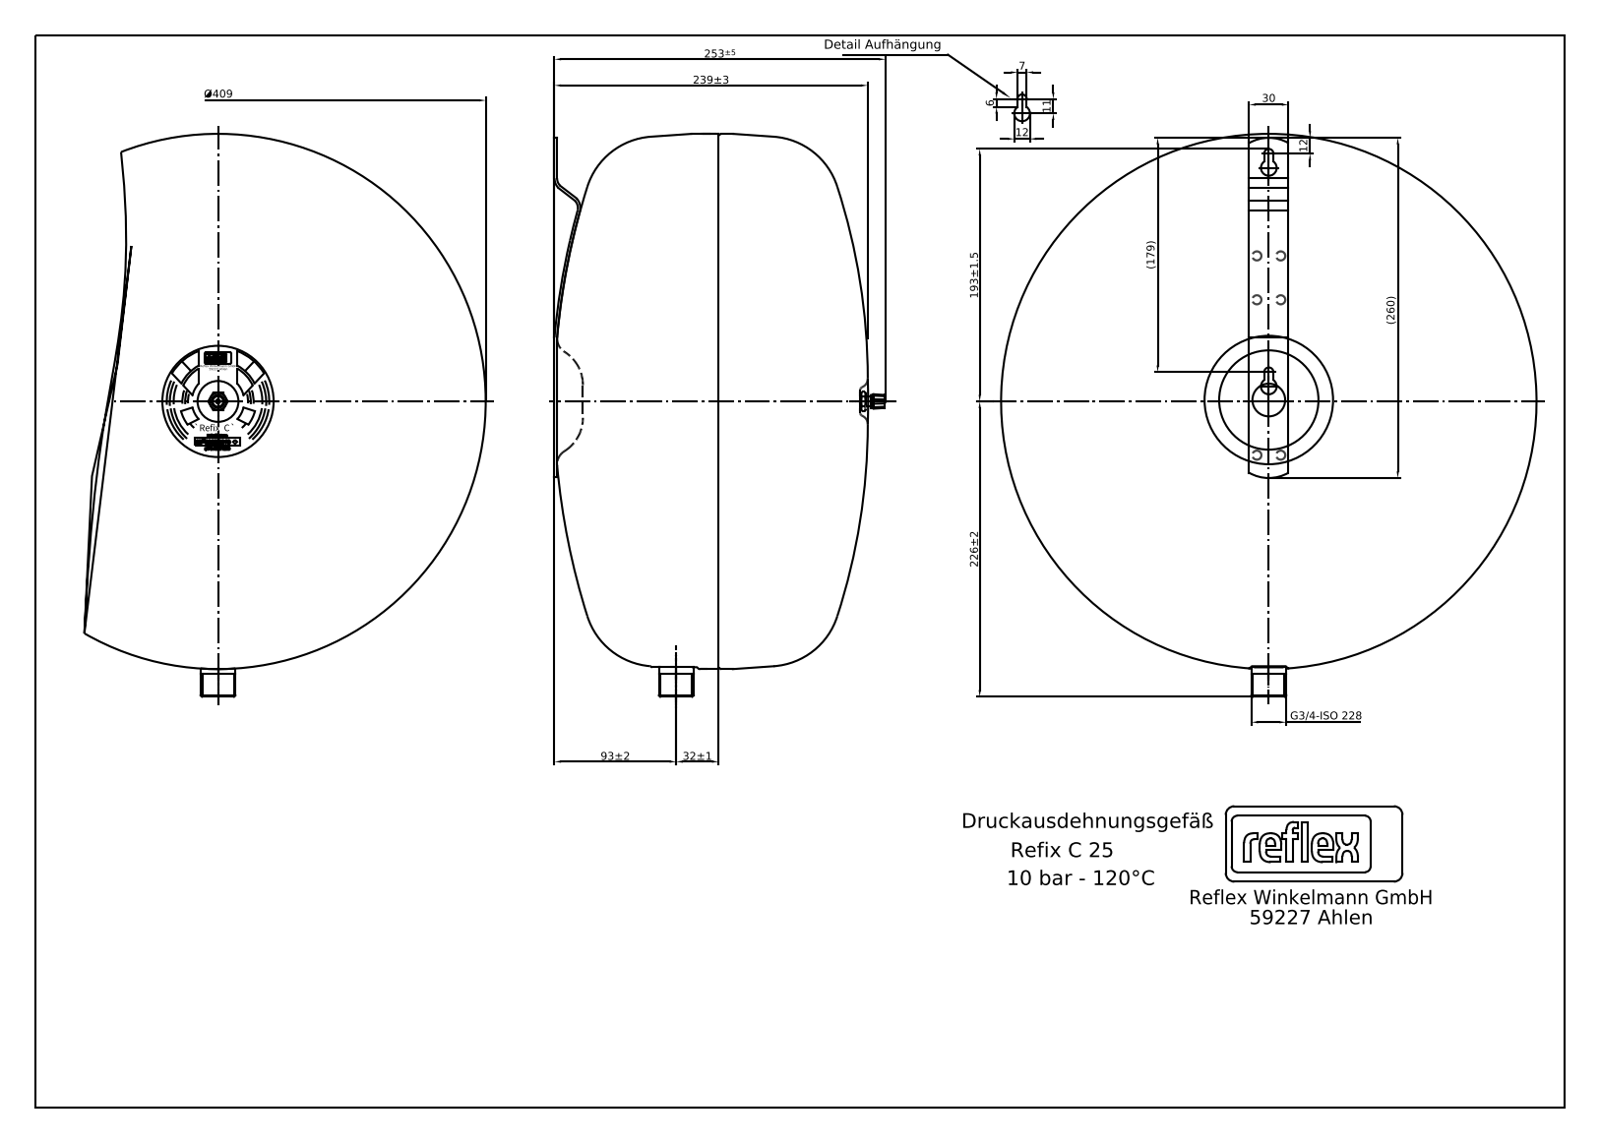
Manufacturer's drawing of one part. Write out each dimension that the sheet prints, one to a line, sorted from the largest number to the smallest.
Ø409
(260)
253±5
239±3
226±2
193±1.5
(179)
93±2
32±1
30
12
12
11
7
6
G3/4-ISO 228
